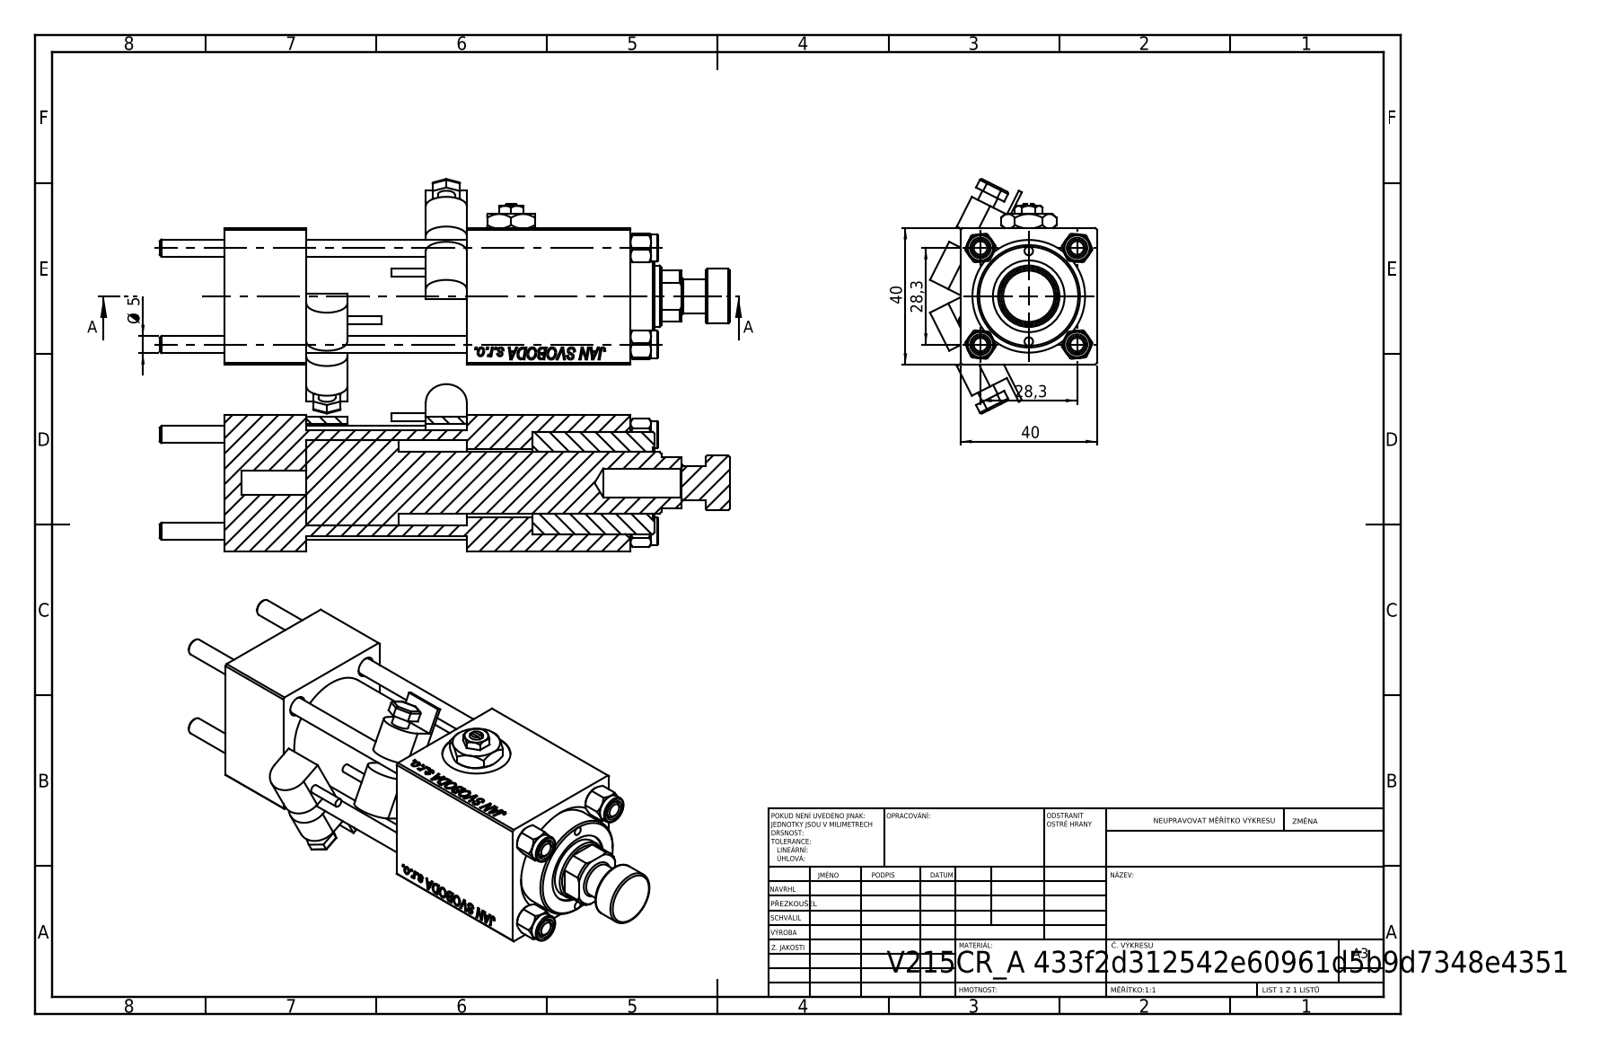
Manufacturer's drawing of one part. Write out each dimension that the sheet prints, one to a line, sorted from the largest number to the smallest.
40
40
28,3
28,3
Ø 5
